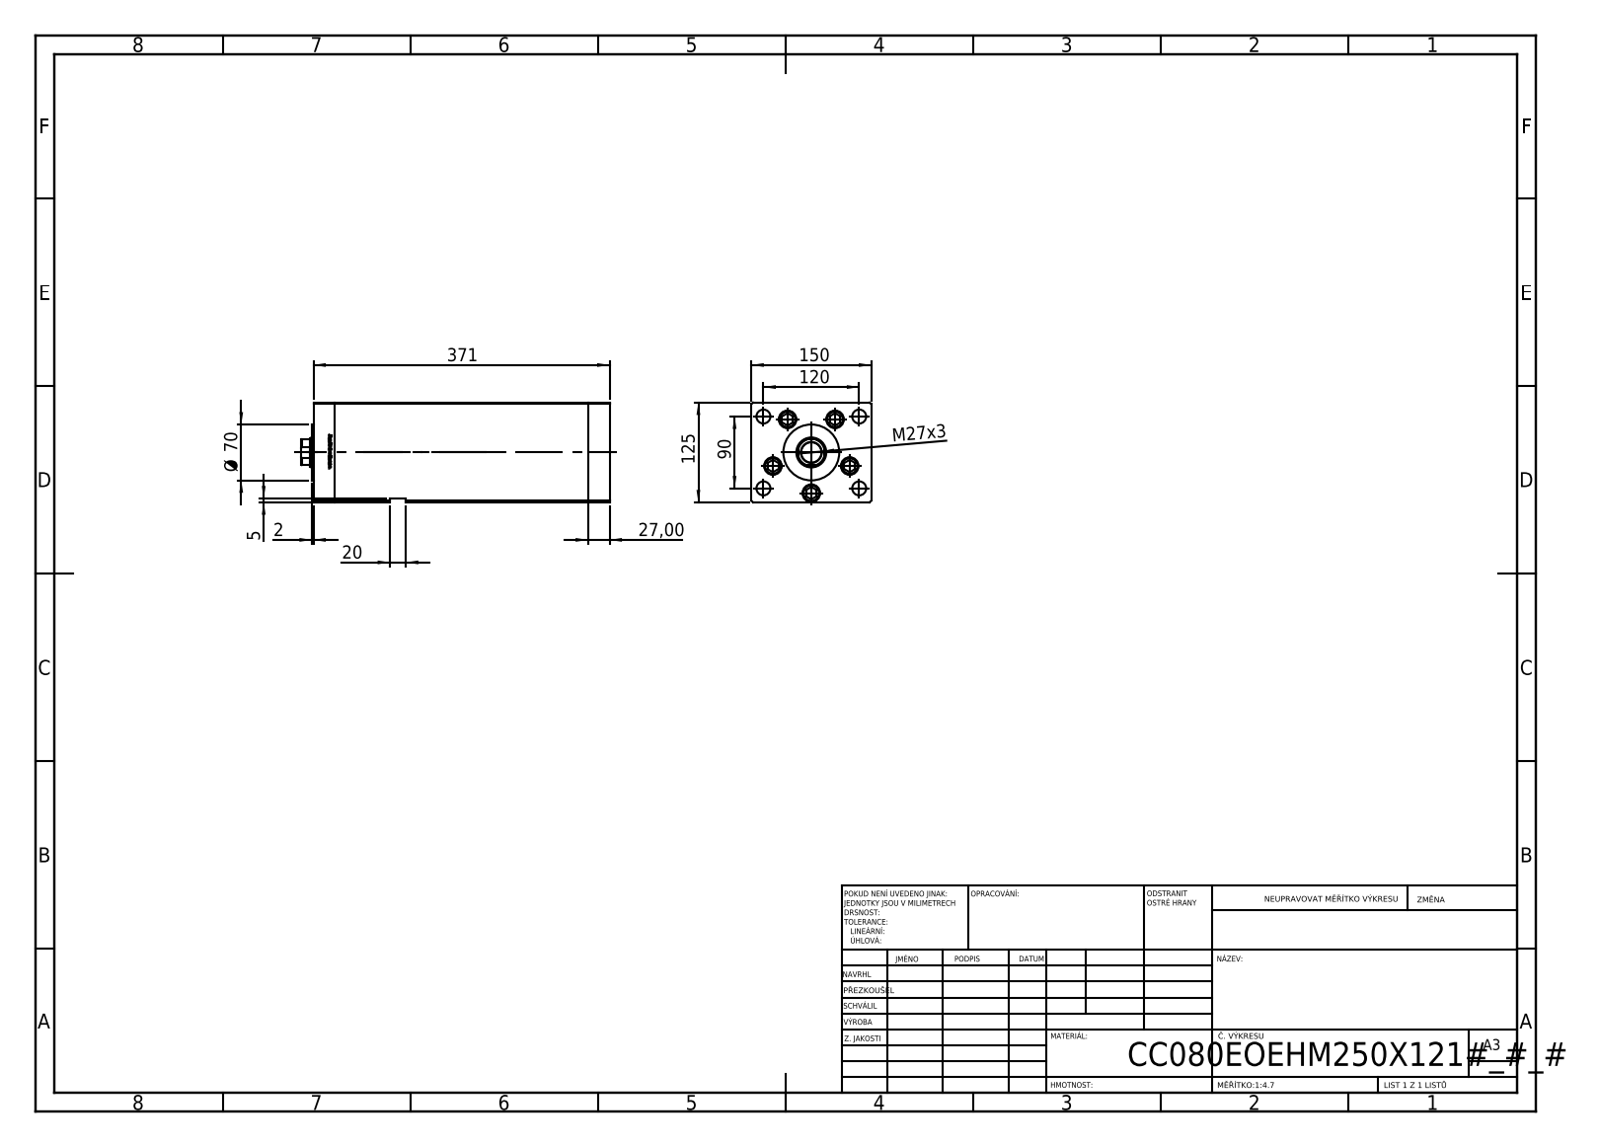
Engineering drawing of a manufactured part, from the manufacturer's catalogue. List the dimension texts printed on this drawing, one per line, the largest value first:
371
150
125
120
90
Ø 70
27,00
M27x3
20
5
2
